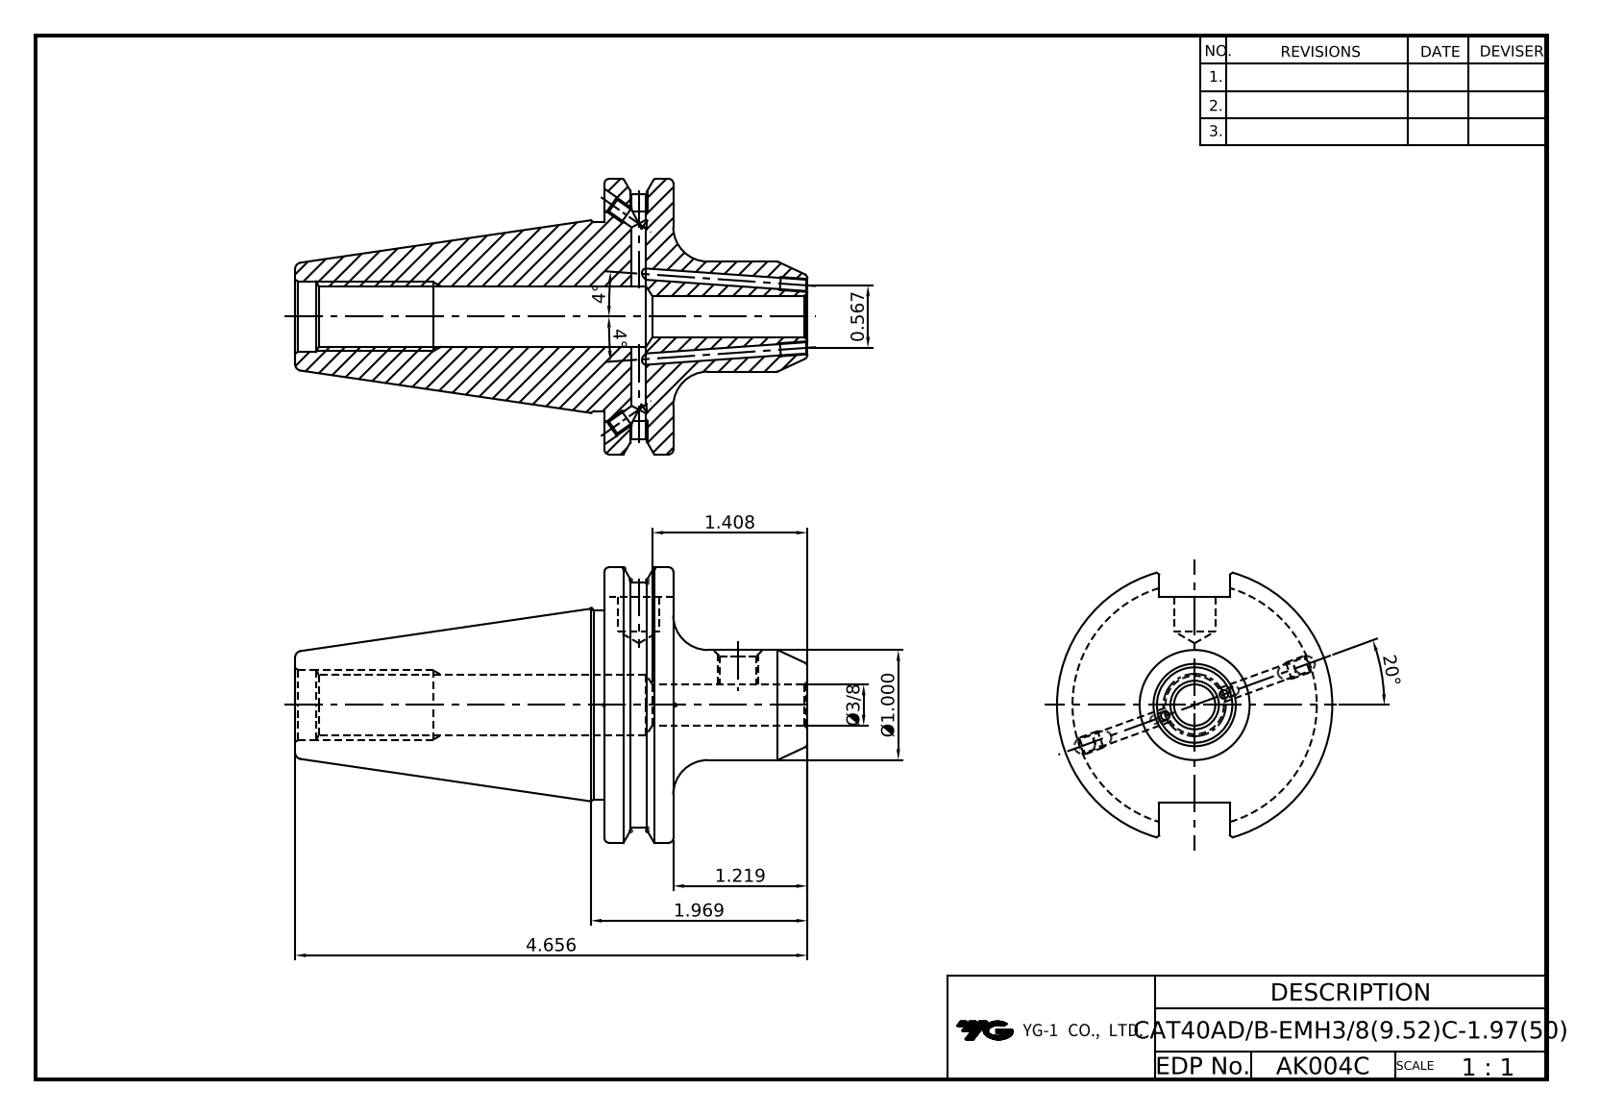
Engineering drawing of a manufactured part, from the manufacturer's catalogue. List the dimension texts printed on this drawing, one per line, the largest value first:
20°
4.656
4°
4°
1.969
1.408
1.219
Ø1.000
0.567
Ø3/8
